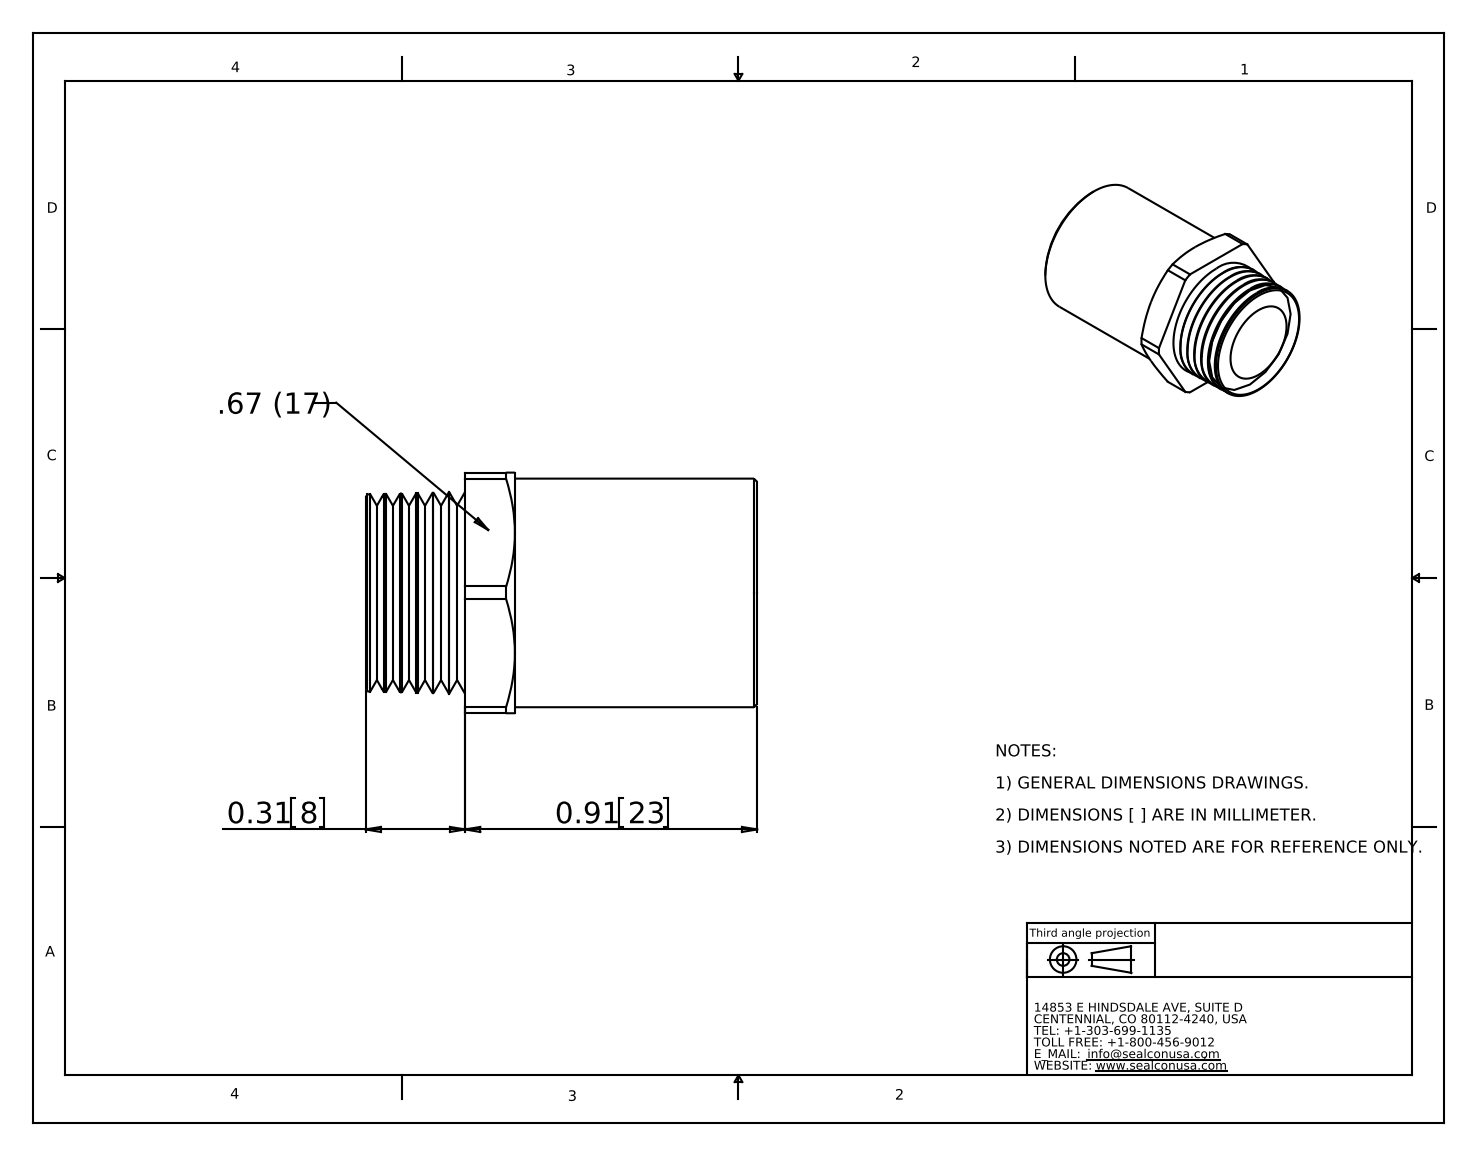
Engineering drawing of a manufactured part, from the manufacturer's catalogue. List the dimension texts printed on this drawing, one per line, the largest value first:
0.91 23
0.31 8
